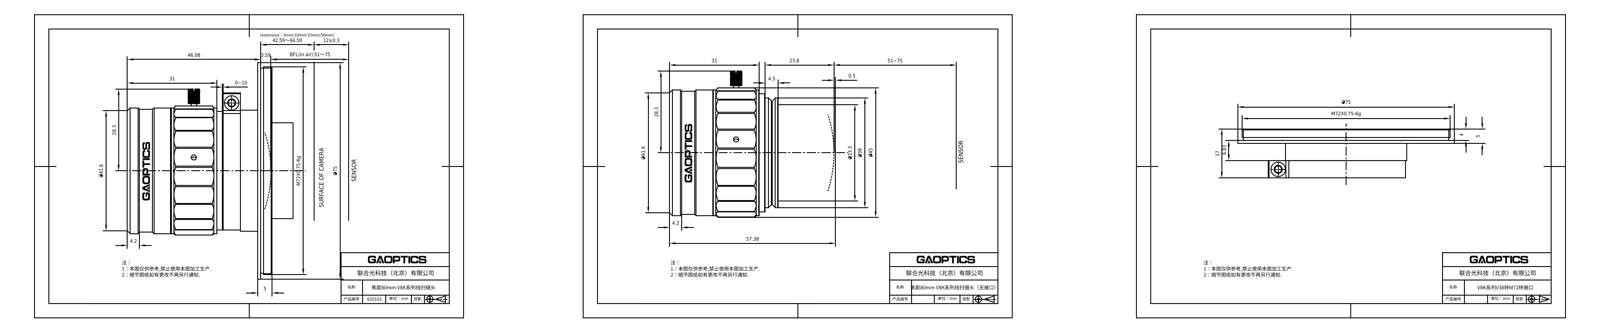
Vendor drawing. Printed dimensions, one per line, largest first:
Ø75
Ø75
M72X0.75-6g
M72X0.75-6g
57.38
51~75
BFL(in air):51～75
46.08
Ø45
42.59～66.59
Ø41.6
Ø41.6
Ø38
Ø33.3
31
31
28.3
28.3
23.8
17
12±0.3
6.83
5
5
4.5
4.2
4.2
4
3.59
0.5
0~10
